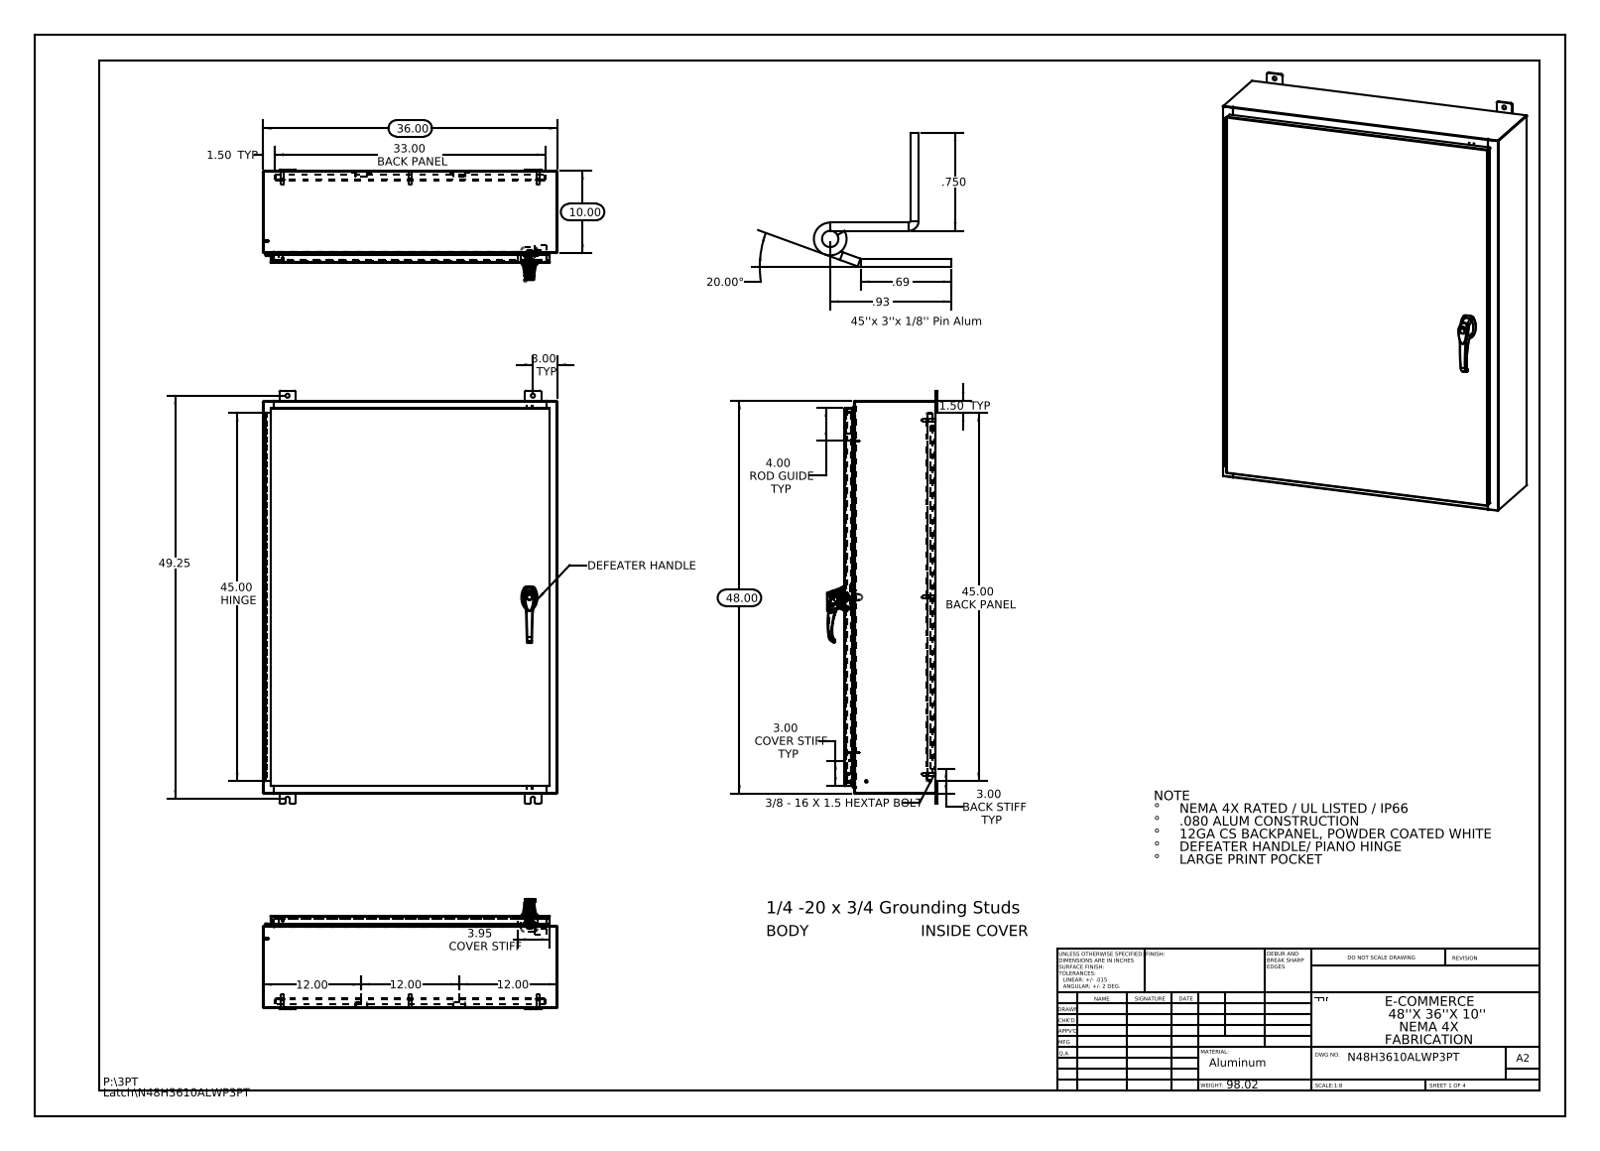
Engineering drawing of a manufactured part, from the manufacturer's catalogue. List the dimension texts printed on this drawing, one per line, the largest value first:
49.25
48.00
45.00 HINGE
45.00 BACK PANEL
36.00
33.00 BACK PANEL
20.00°
12.00
12.00
12.00
10.00
4.00 ROD GUIDE TYP
3.95 COVER STIFF
3.00 TYP
3.00 BACK STIFF TYP
3.00 COVER STIFF TYP
1.50 TYP
1.50 TYP
.93
.750
.69
